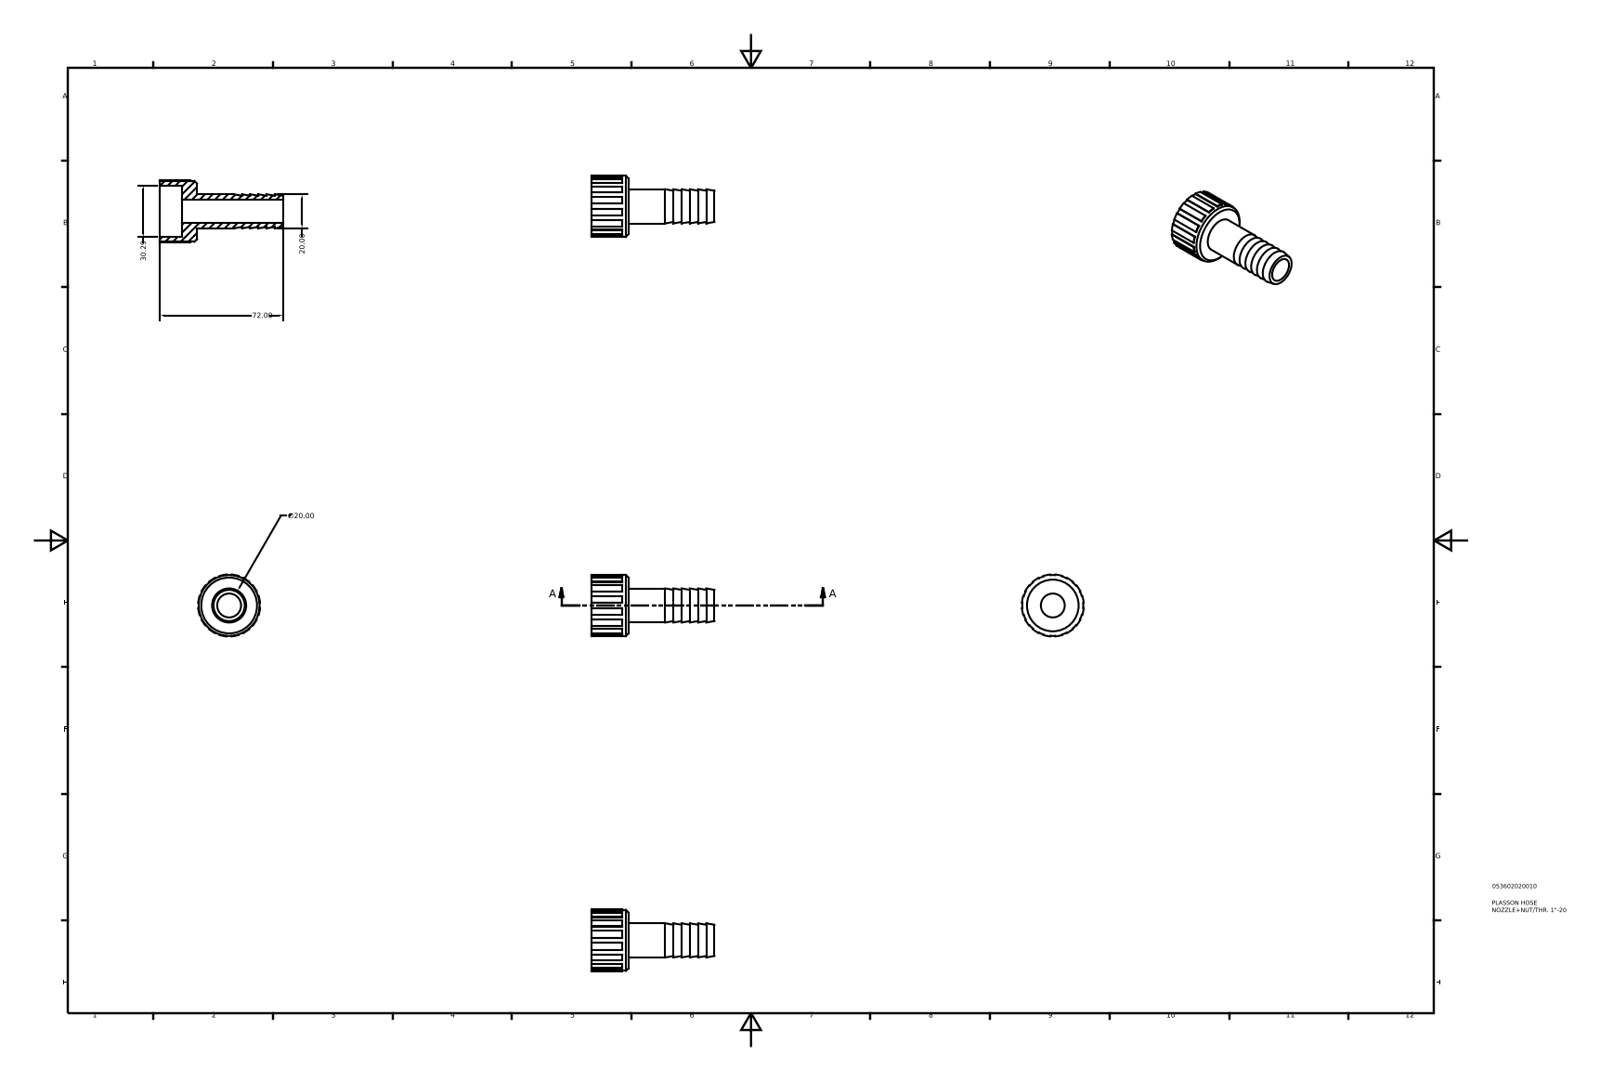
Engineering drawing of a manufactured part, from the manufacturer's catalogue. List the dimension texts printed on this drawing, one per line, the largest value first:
72.00
30.29
20.00
∅20.00
